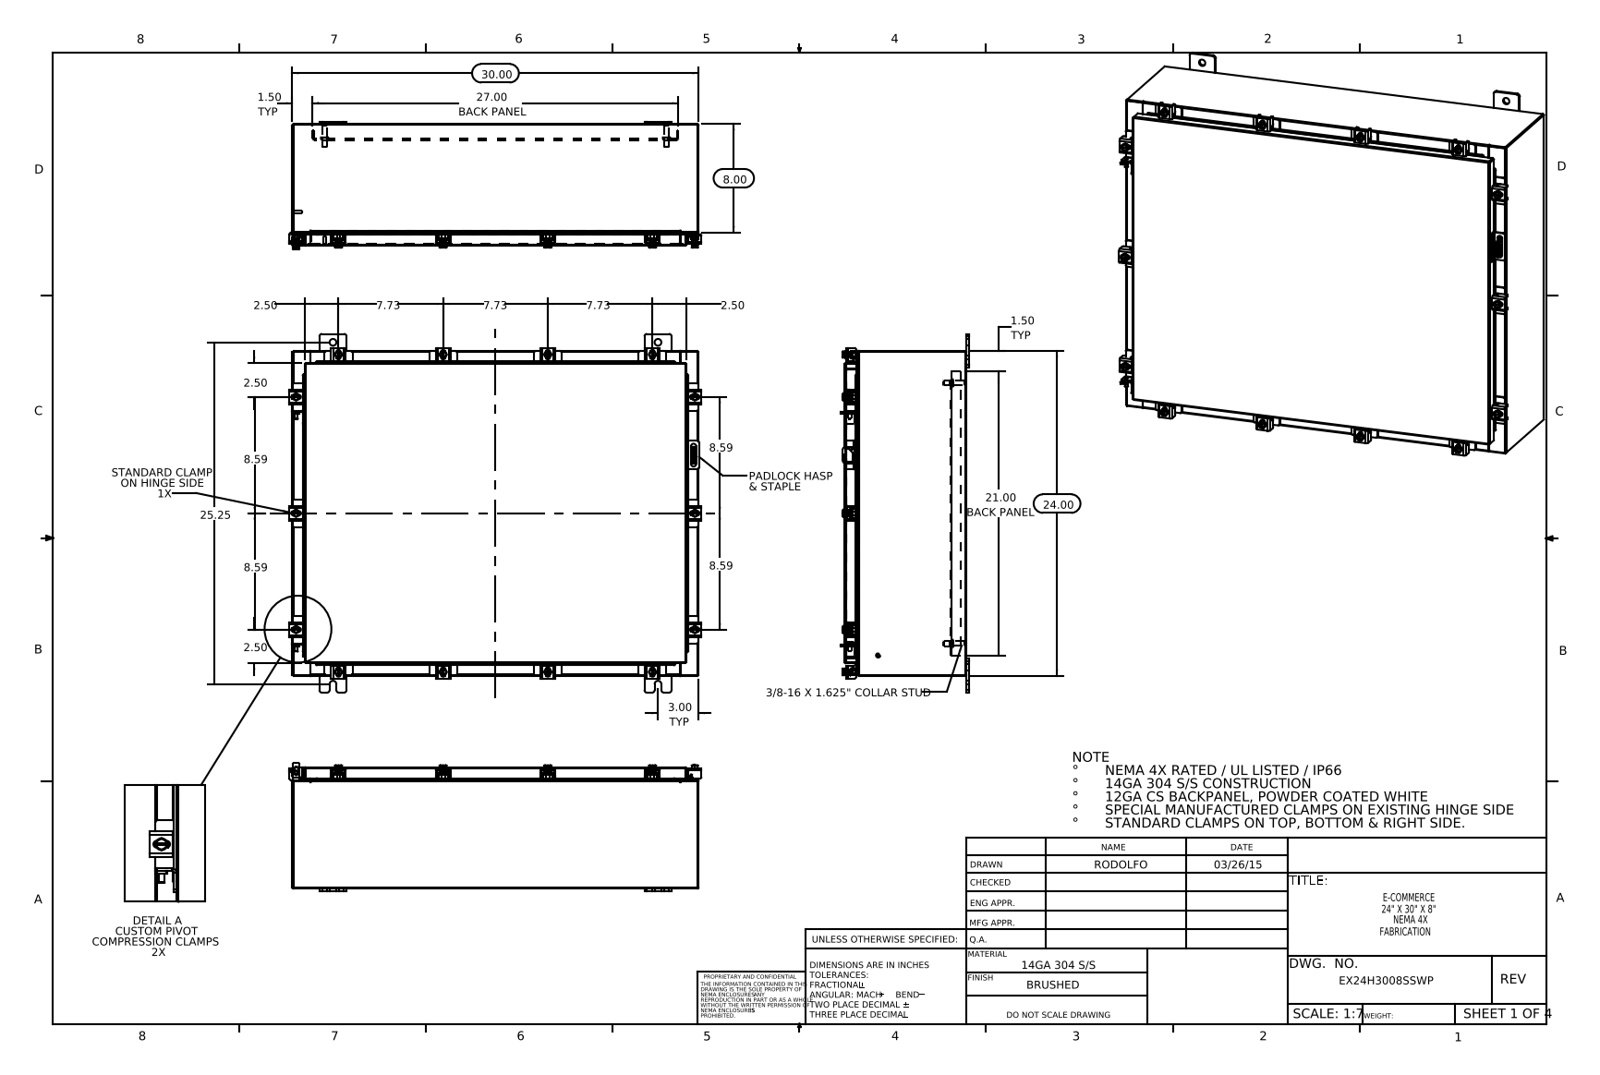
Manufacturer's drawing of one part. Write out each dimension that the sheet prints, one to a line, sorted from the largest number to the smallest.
30.00
27.00 BACK PANEL
25.25
24.00
21.00 BACK PANEL
8.59
8.59
8.59
8.59
8.00
7.73
7.73
7.73
3.00 TYP
2.50
2.50
2.50
2.50
1.50 TYP
1.50 TYP
